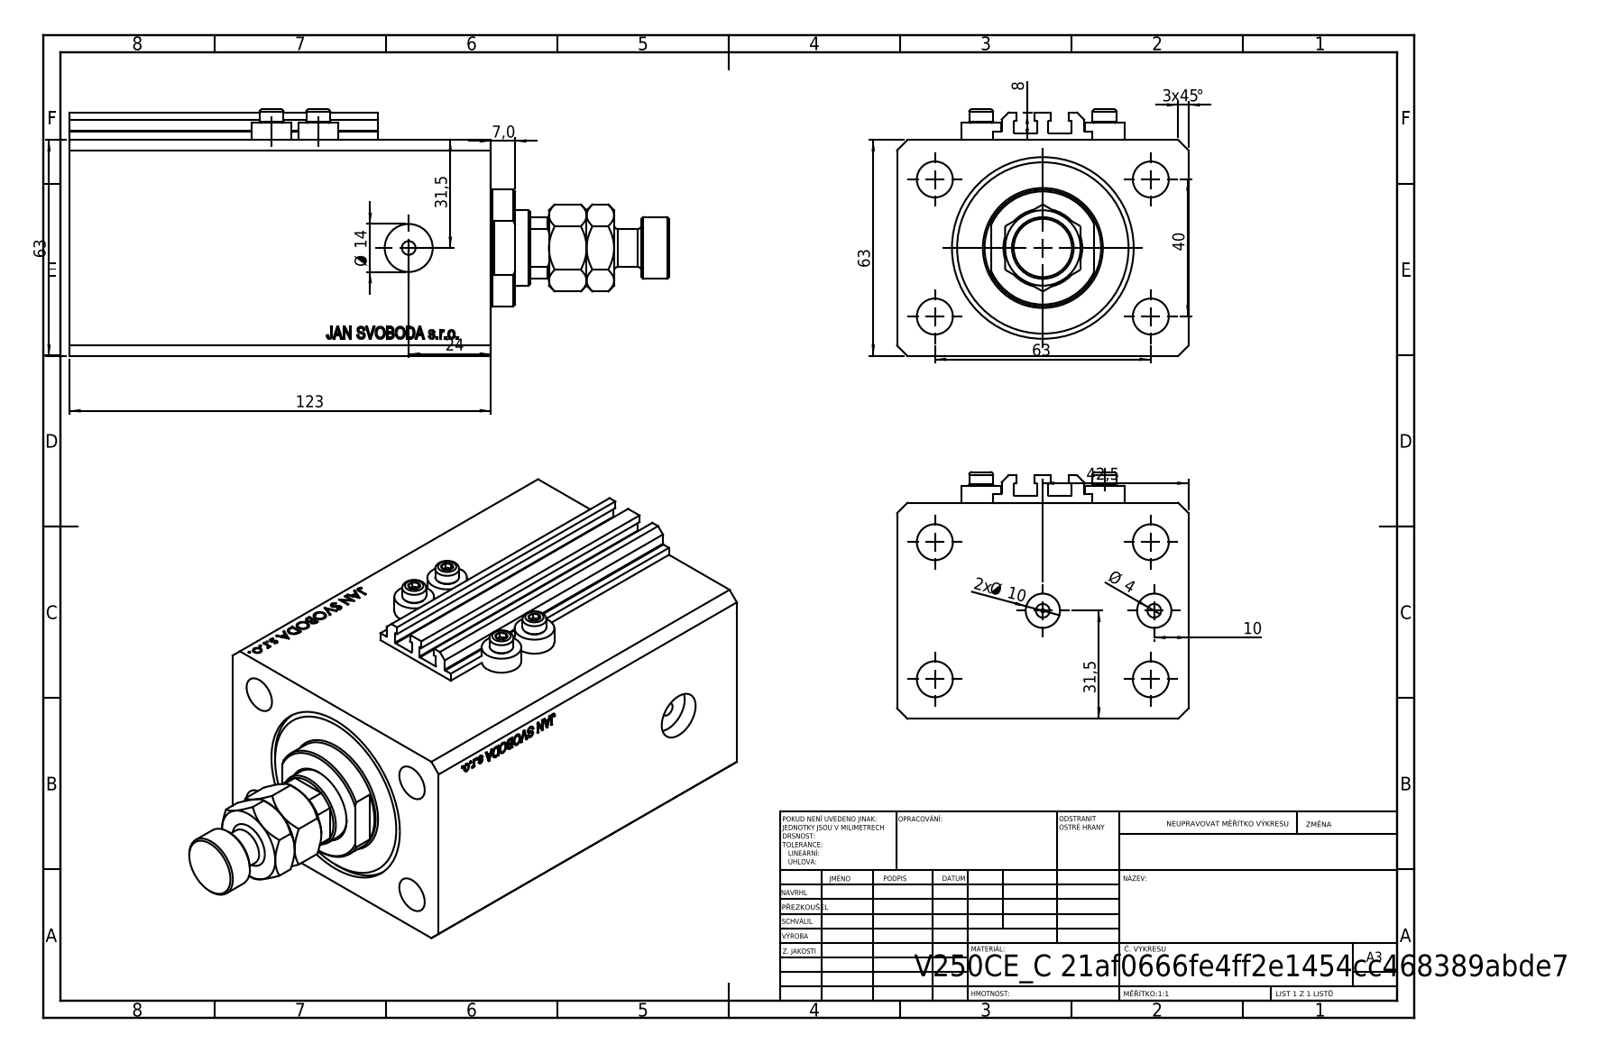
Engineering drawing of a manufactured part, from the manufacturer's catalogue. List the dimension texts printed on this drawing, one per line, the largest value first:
123
63
63
63
3 x45 °
42,5
40
31,5
31,5
24
Ø 14
2x Ø 10
10
8
7,0
Ø 4
